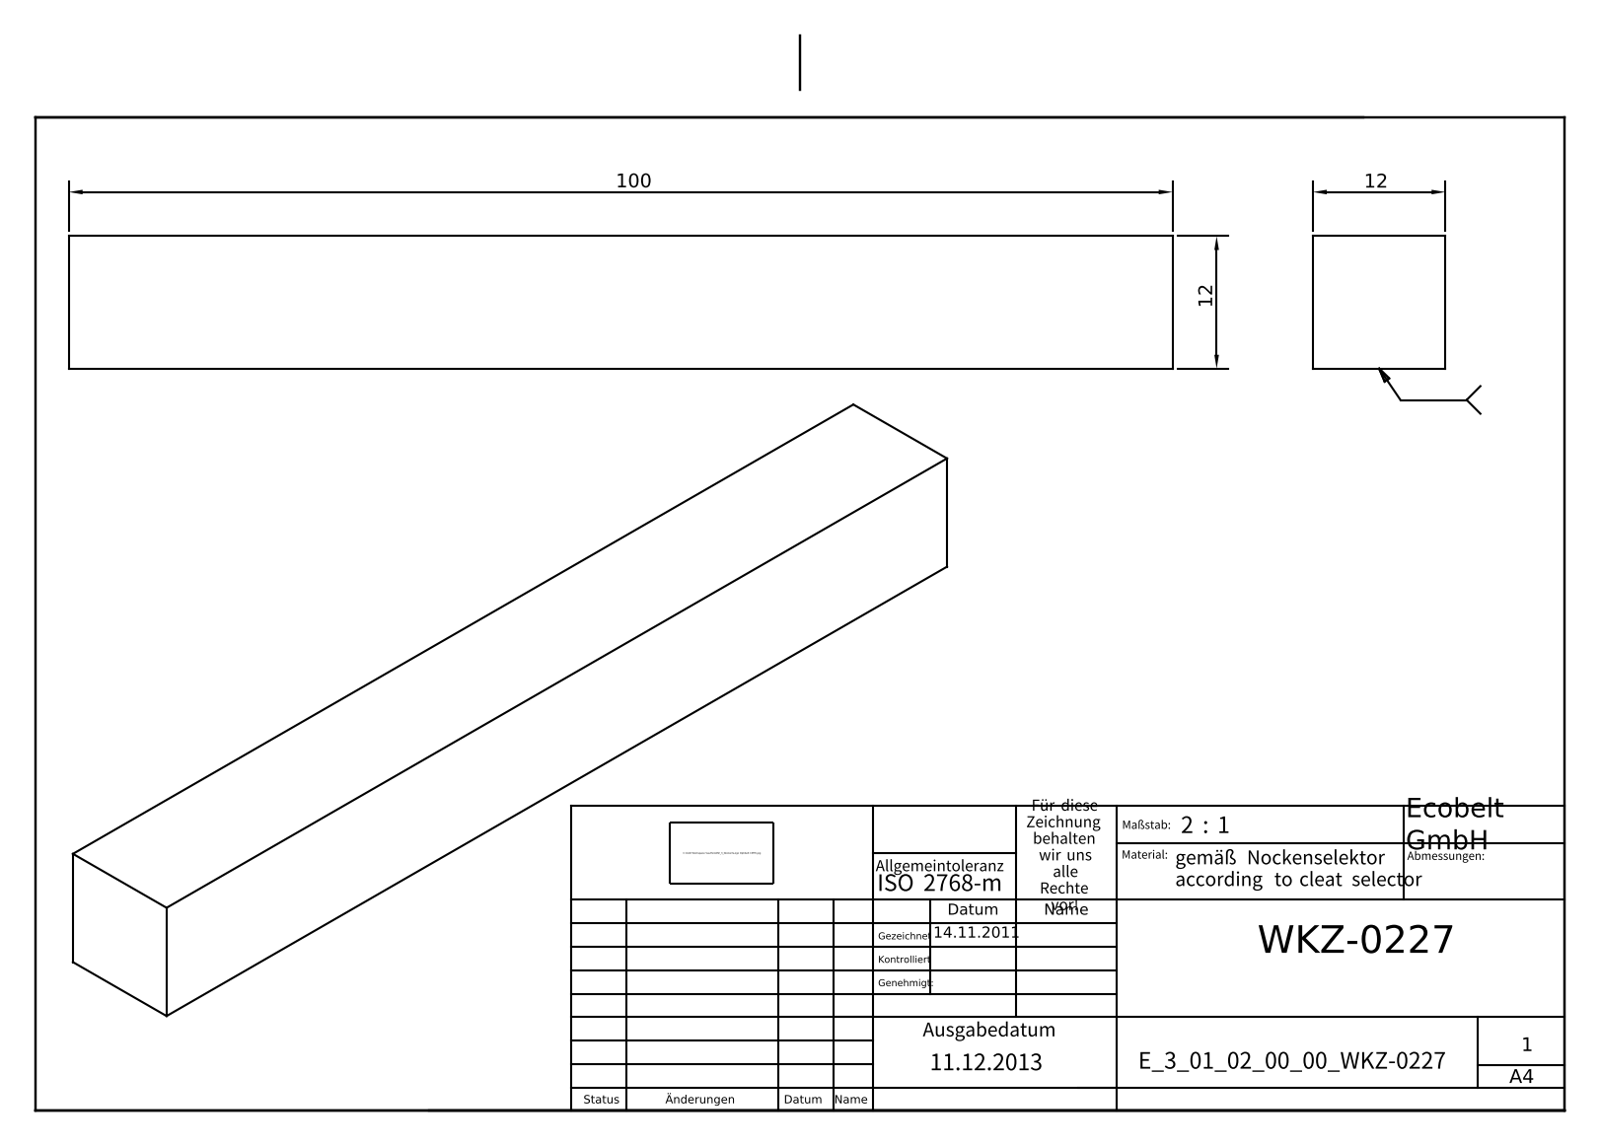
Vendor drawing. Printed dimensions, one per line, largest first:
100
12
12
